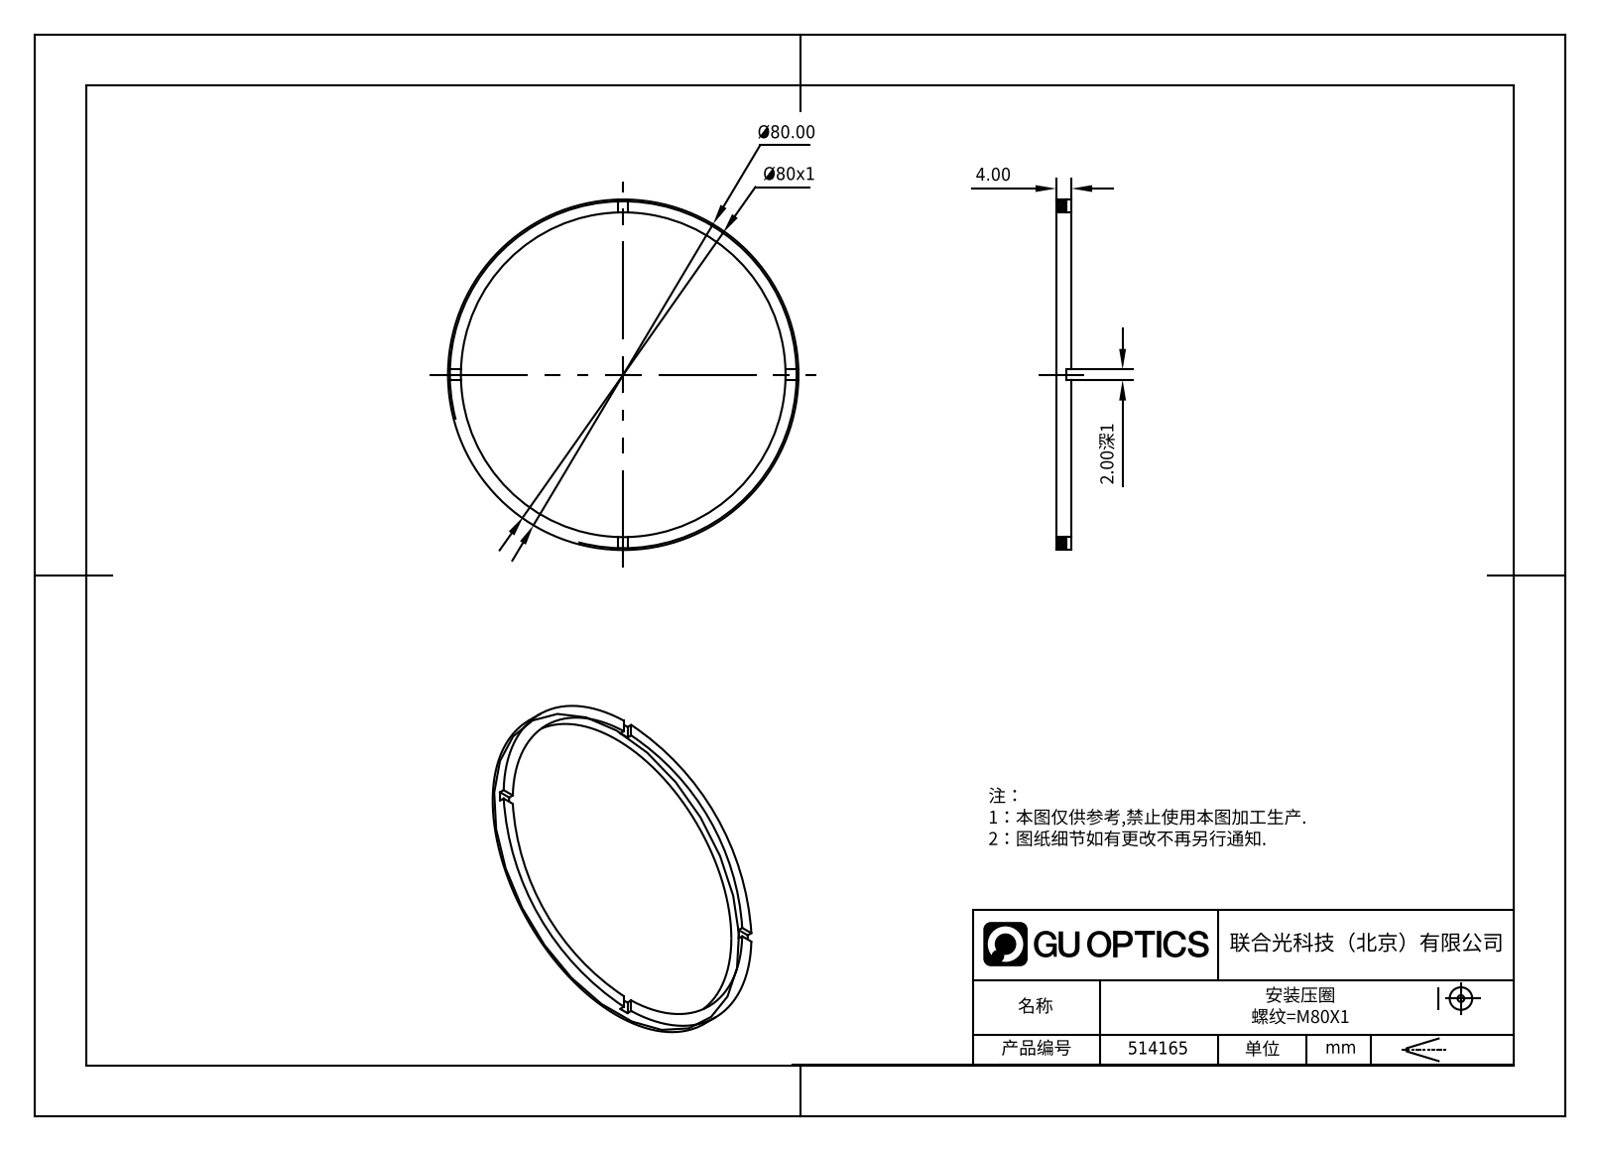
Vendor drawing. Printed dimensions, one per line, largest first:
Ø80.00
Ø80x1
4.00
2.00深1
